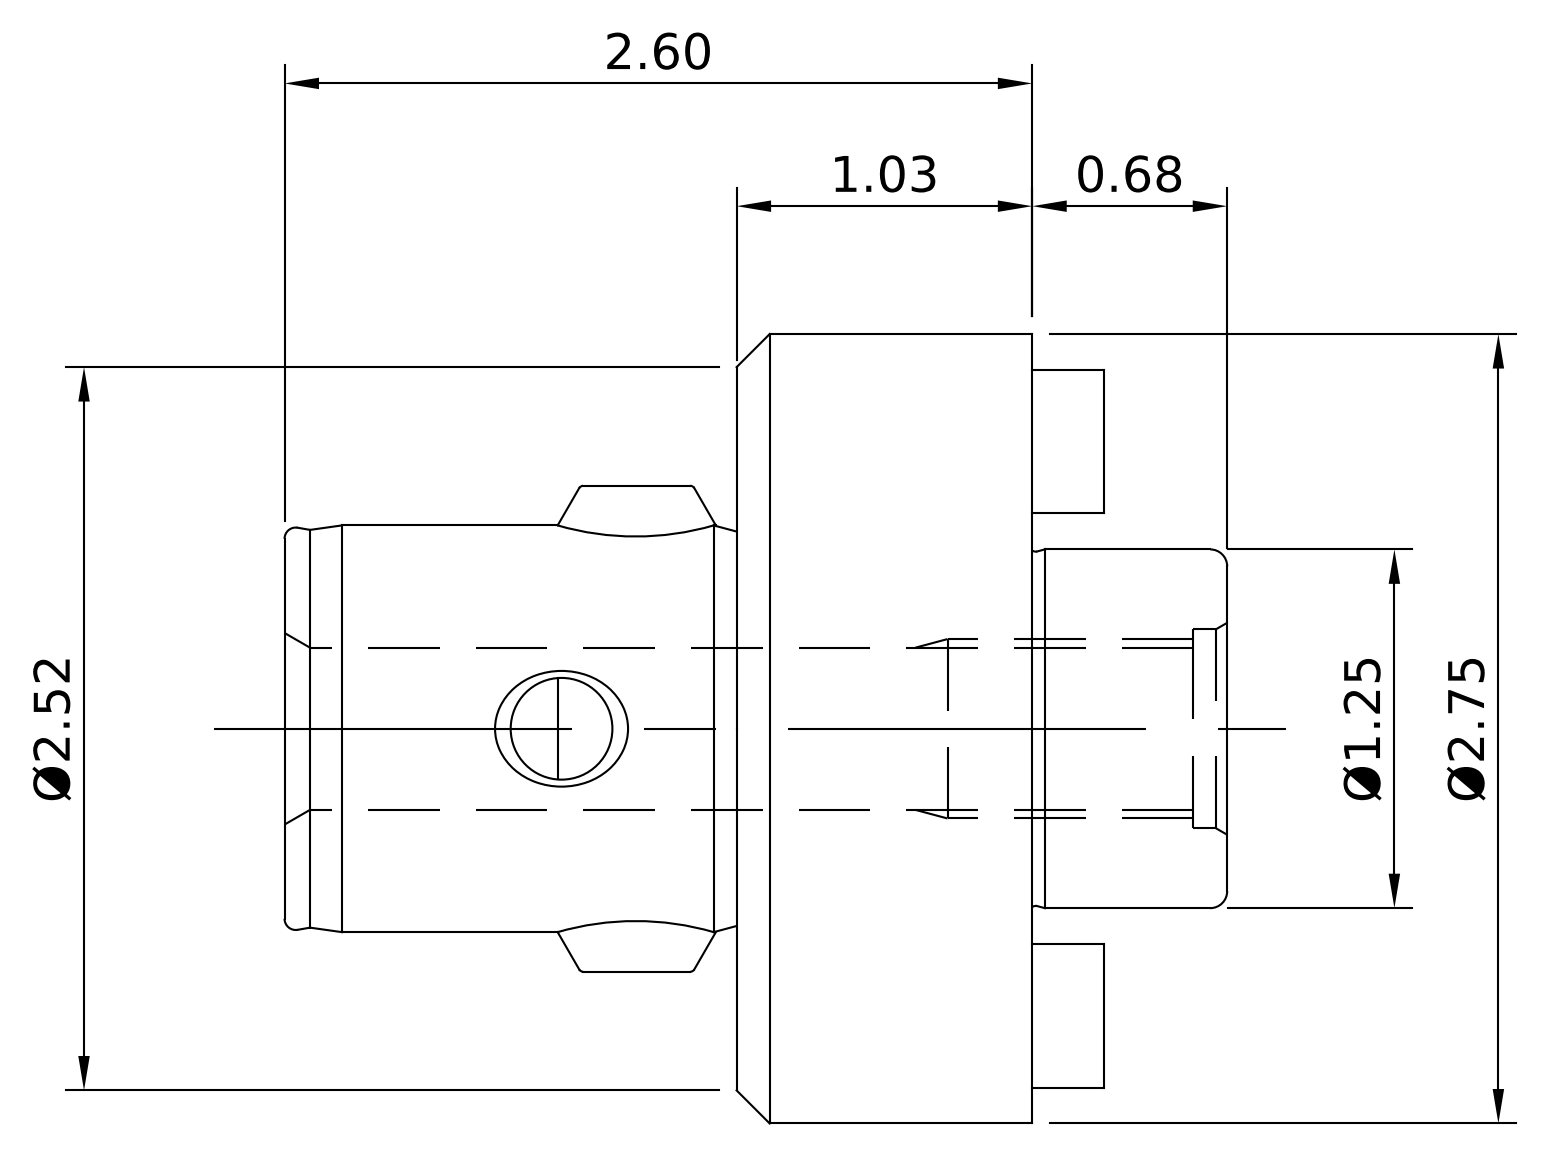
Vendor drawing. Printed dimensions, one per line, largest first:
Ø2.75
2.60
Ø2.52
Ø1.25
1.03
0.68
